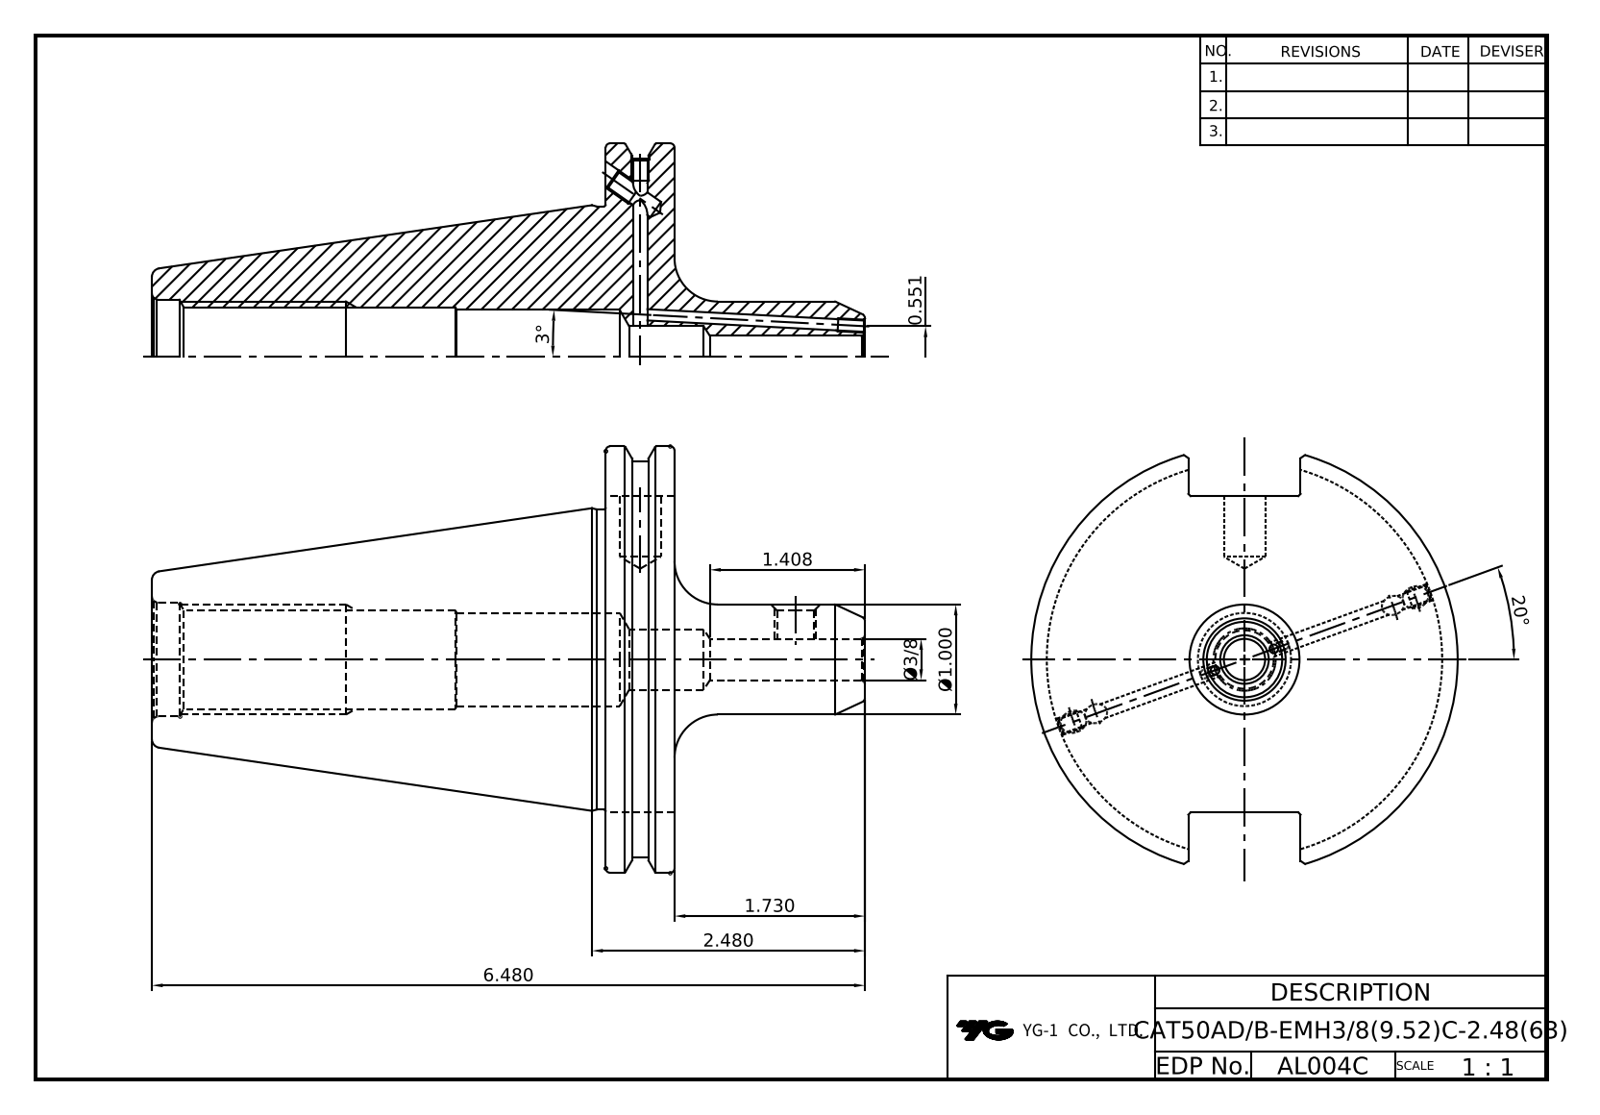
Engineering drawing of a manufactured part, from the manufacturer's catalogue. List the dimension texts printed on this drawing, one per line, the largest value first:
20°
6.480
3°
2.480
1.730
1.408
Ø1.000
Ø3/8
